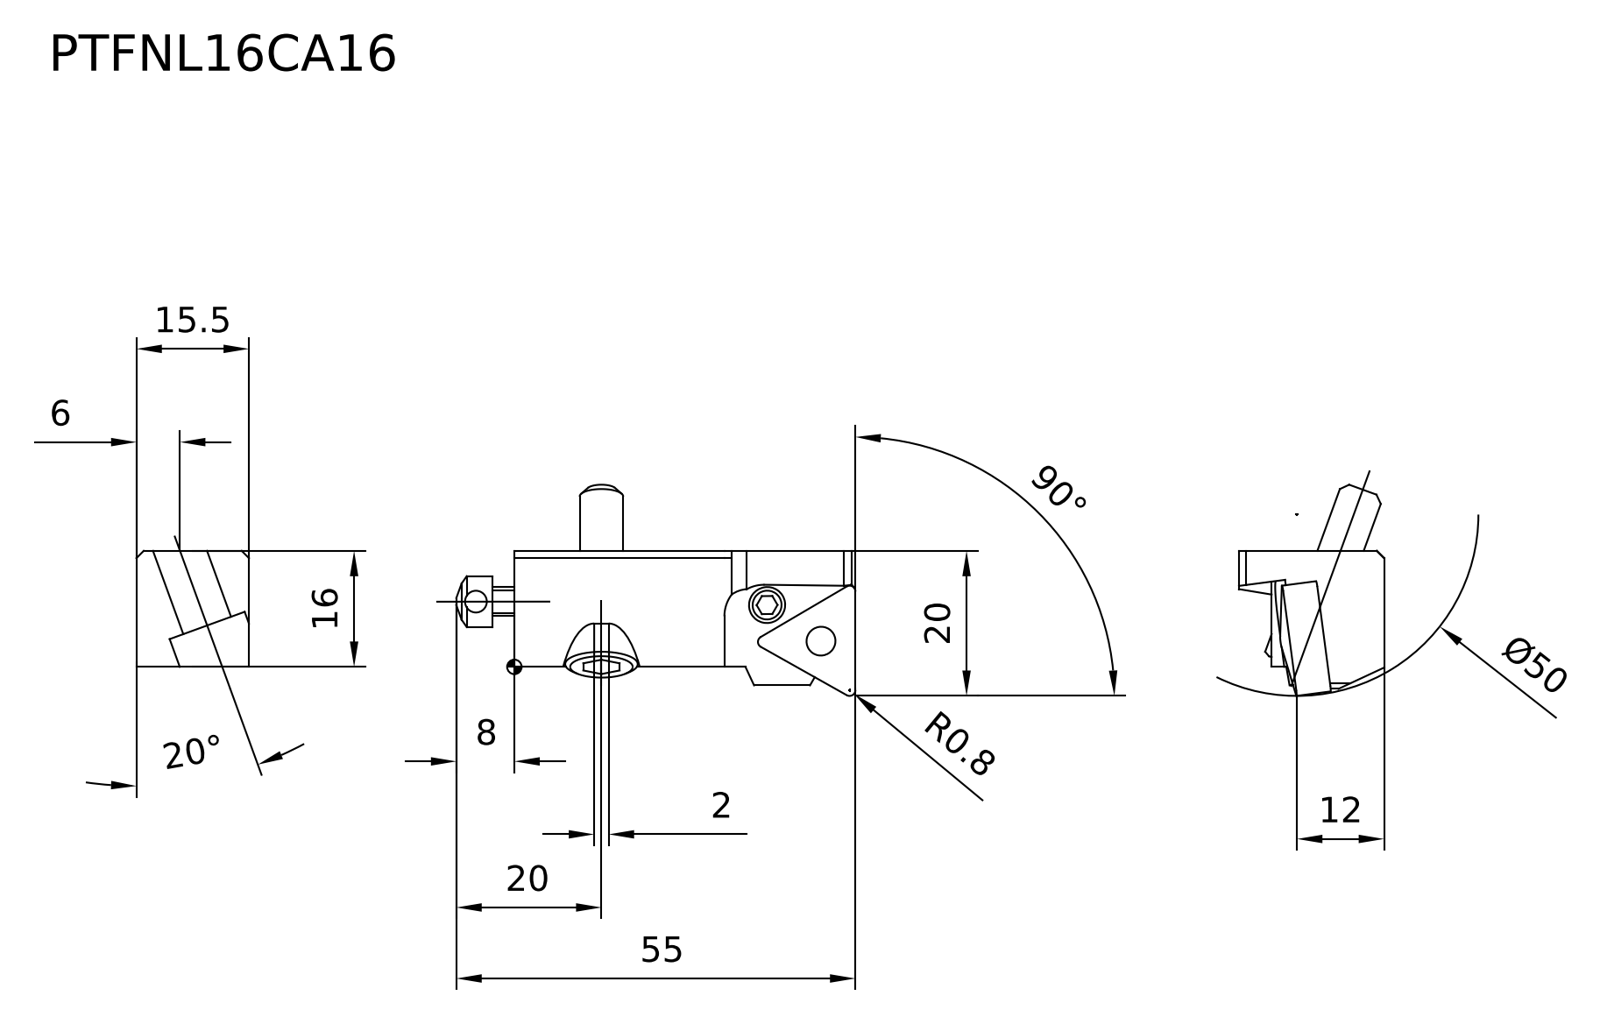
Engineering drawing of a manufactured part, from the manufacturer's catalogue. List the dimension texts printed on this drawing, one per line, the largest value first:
90°
55
Ø50
20
20°
20
16
15.5
12
8
6
2
R0.8
